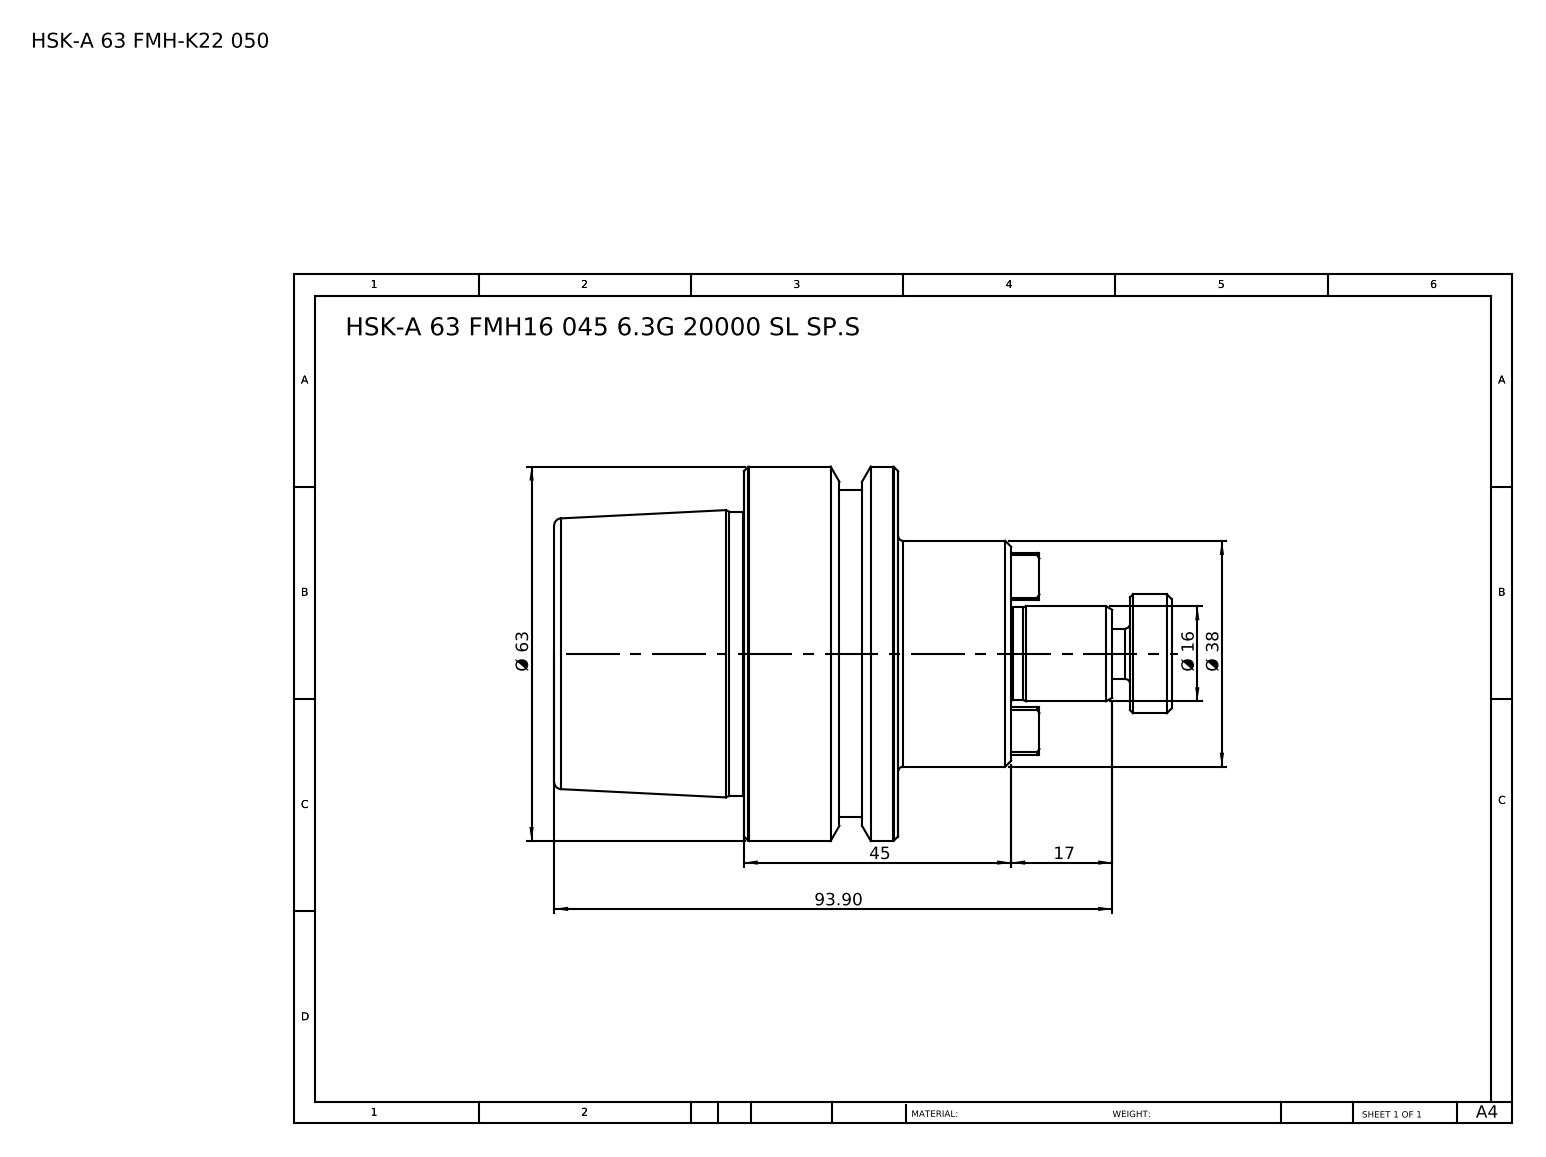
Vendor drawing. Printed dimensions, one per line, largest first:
93.90
Ø 63
45
Ø 38
17
Ø 16
